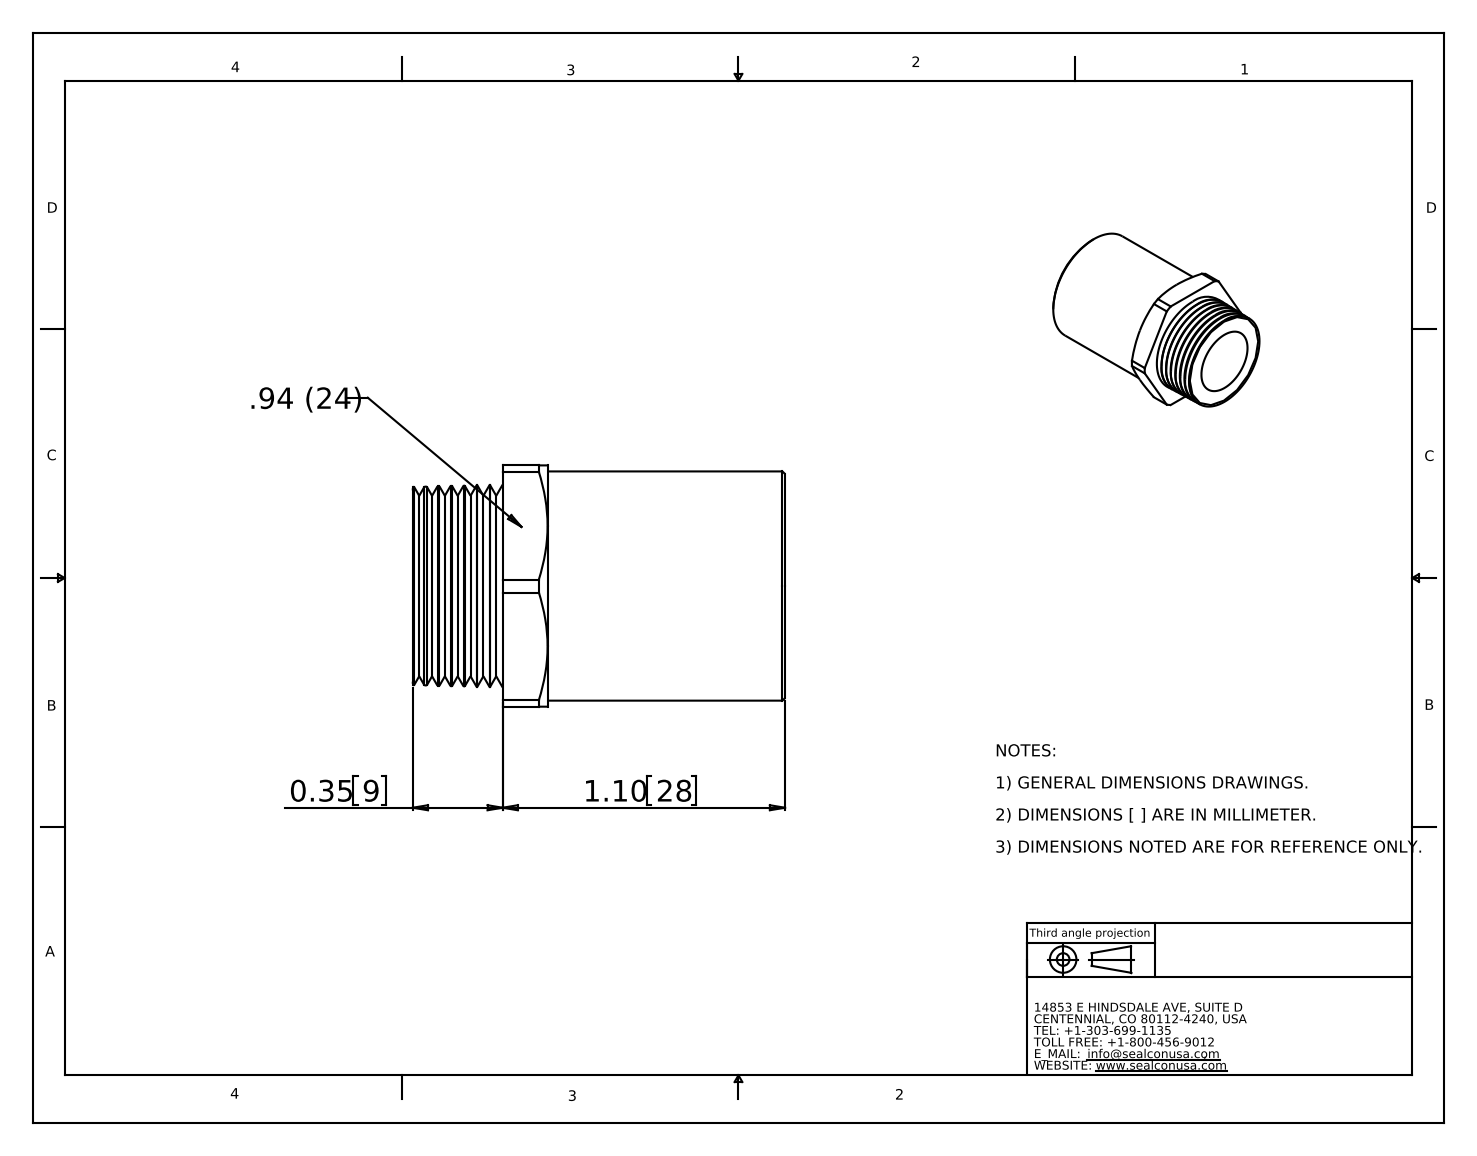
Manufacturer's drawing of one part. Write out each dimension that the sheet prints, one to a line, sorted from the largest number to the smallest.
1.10 28
0.35 9
